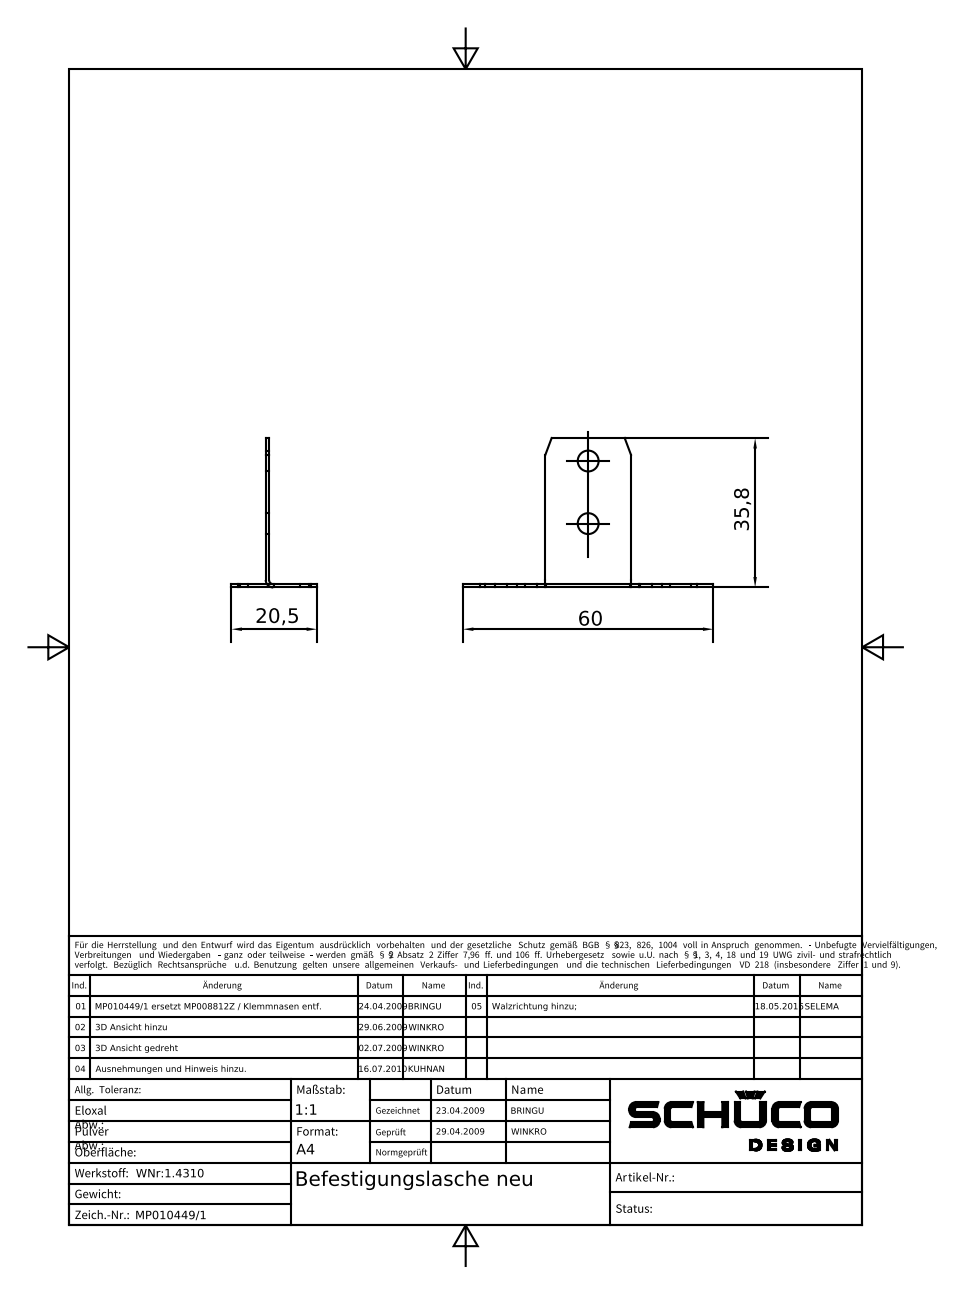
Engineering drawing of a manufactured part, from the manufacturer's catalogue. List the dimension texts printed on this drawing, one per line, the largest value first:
60
35,8
20,5
